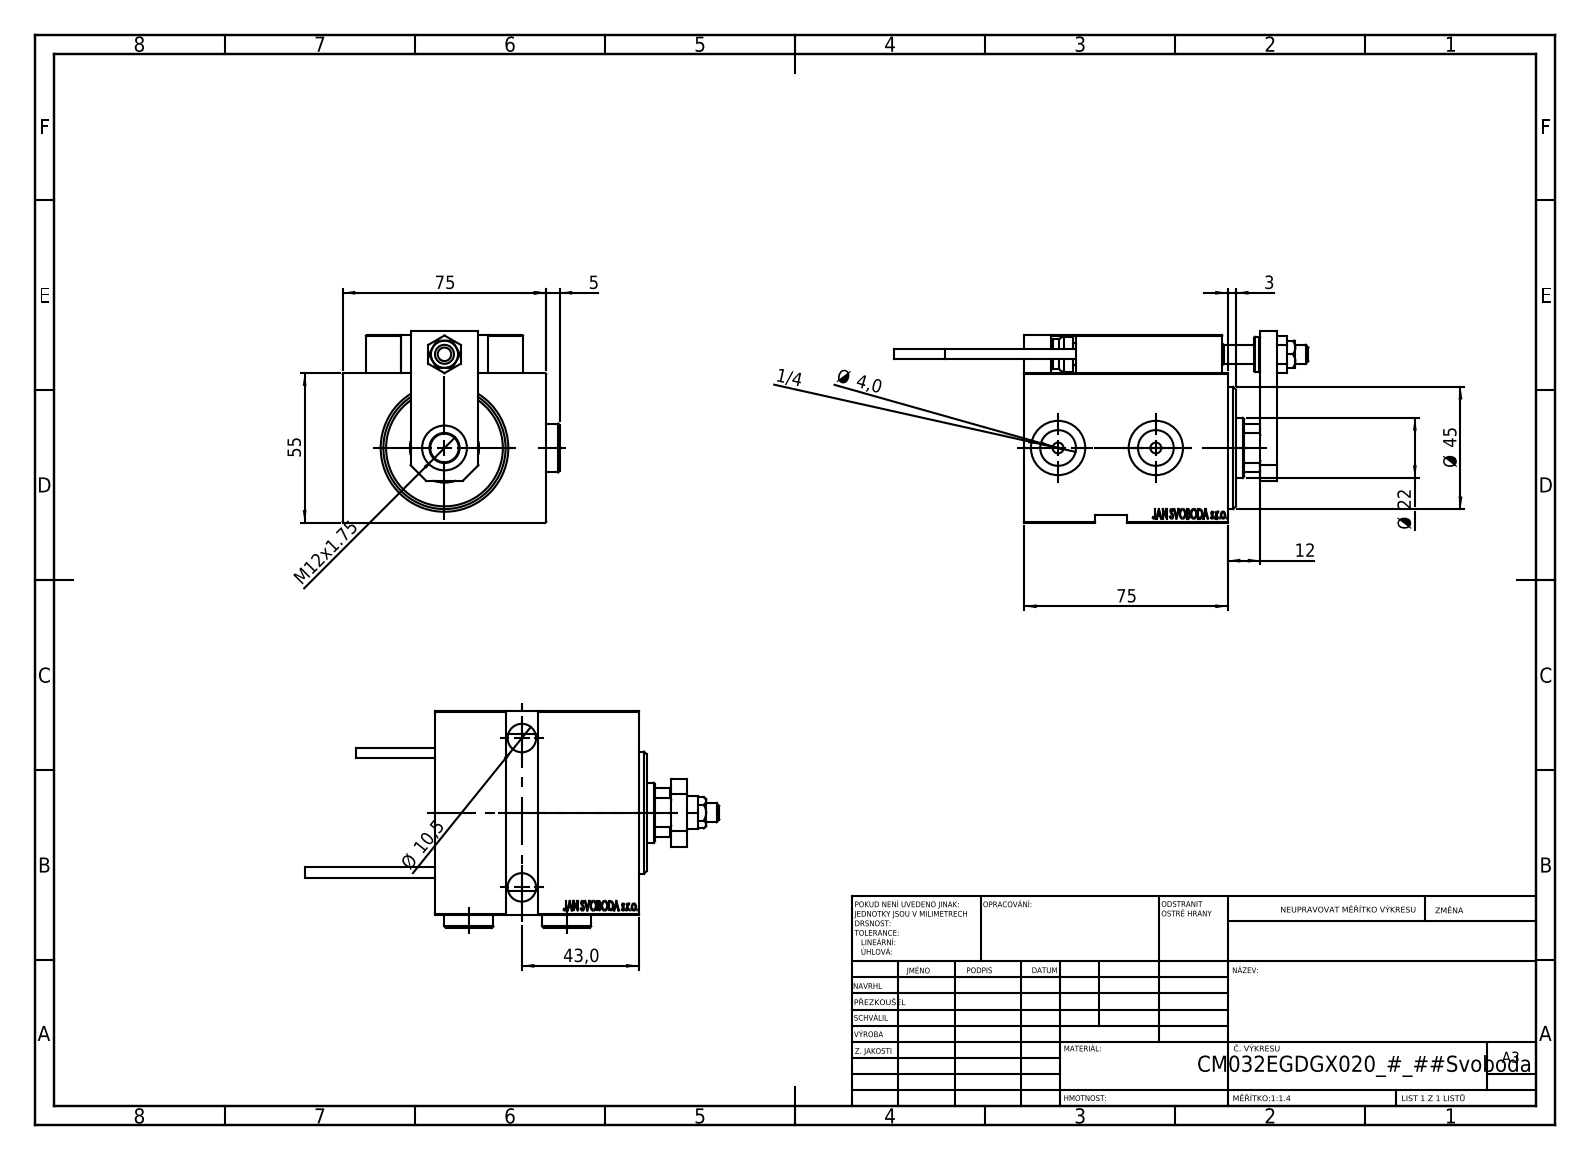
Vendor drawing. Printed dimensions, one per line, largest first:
75
75
55
Ø 45
43,0
Ø 22
M12x1.75
12
Ø 10,5
5
Ø 4,0
3
1/4
